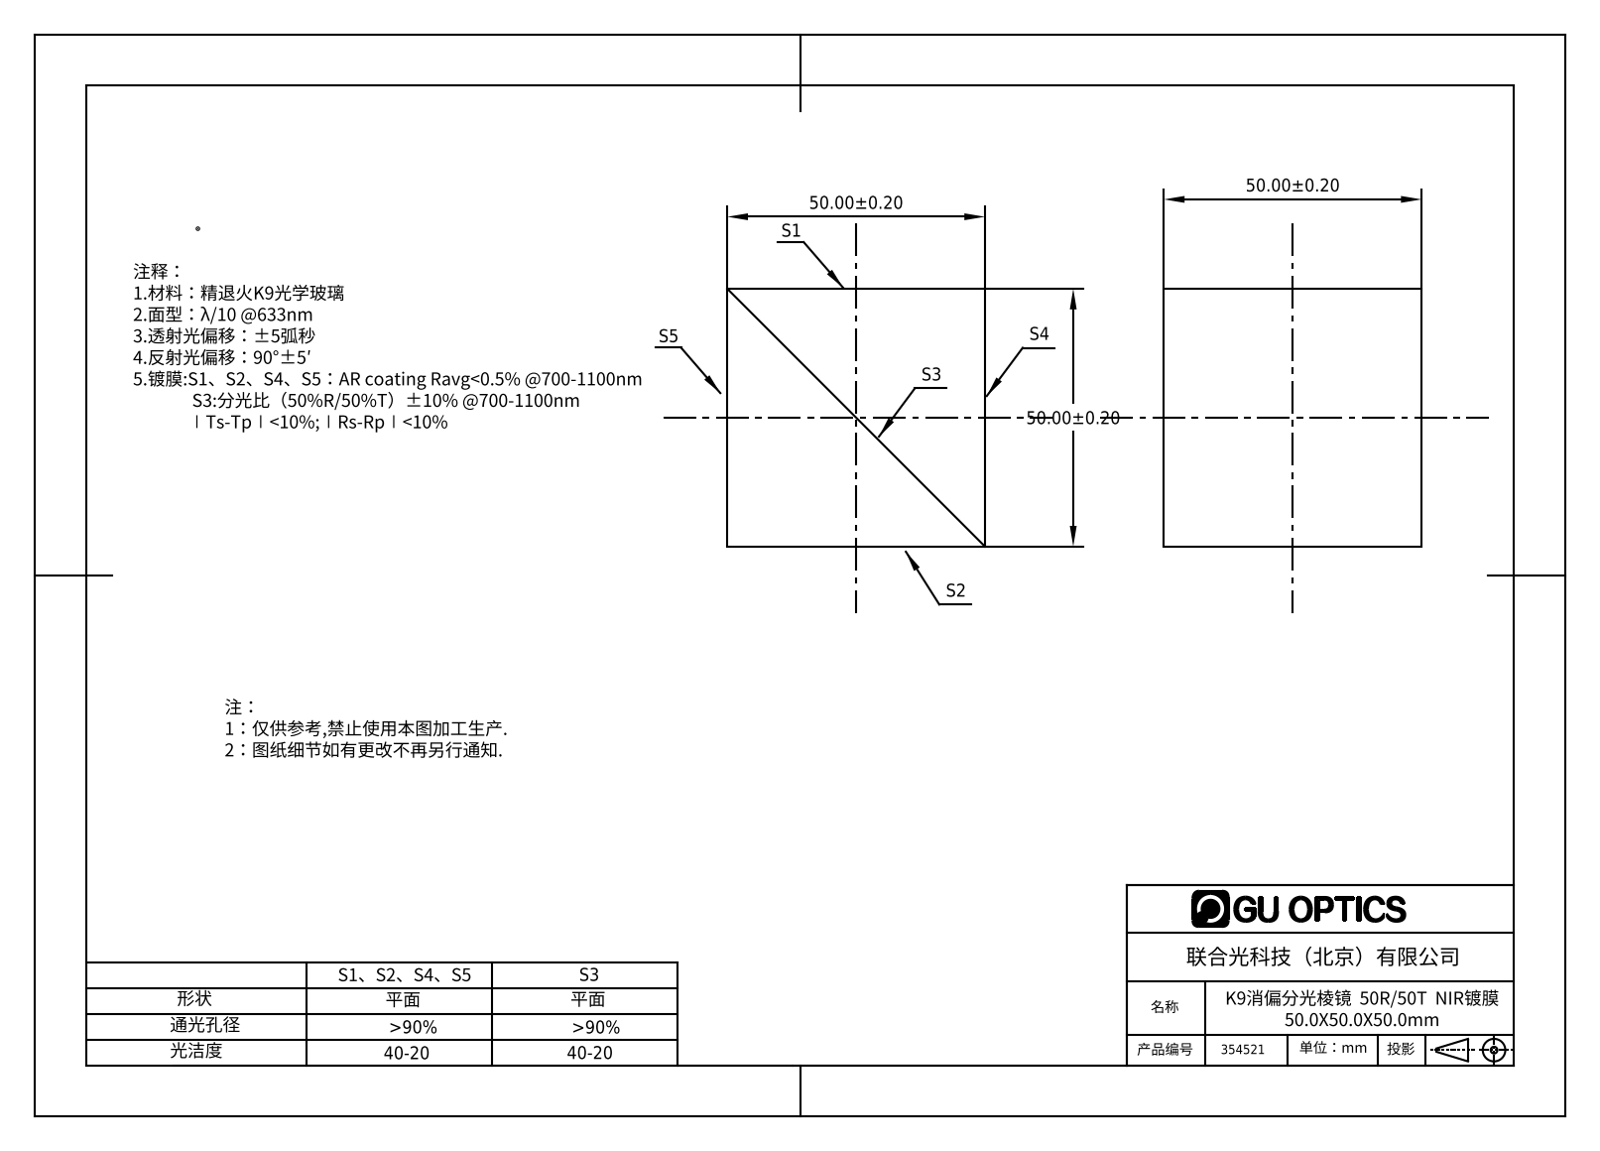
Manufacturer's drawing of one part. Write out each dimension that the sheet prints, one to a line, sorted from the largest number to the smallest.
50.00±0.20
50.00±0.20
50.00±0.20
